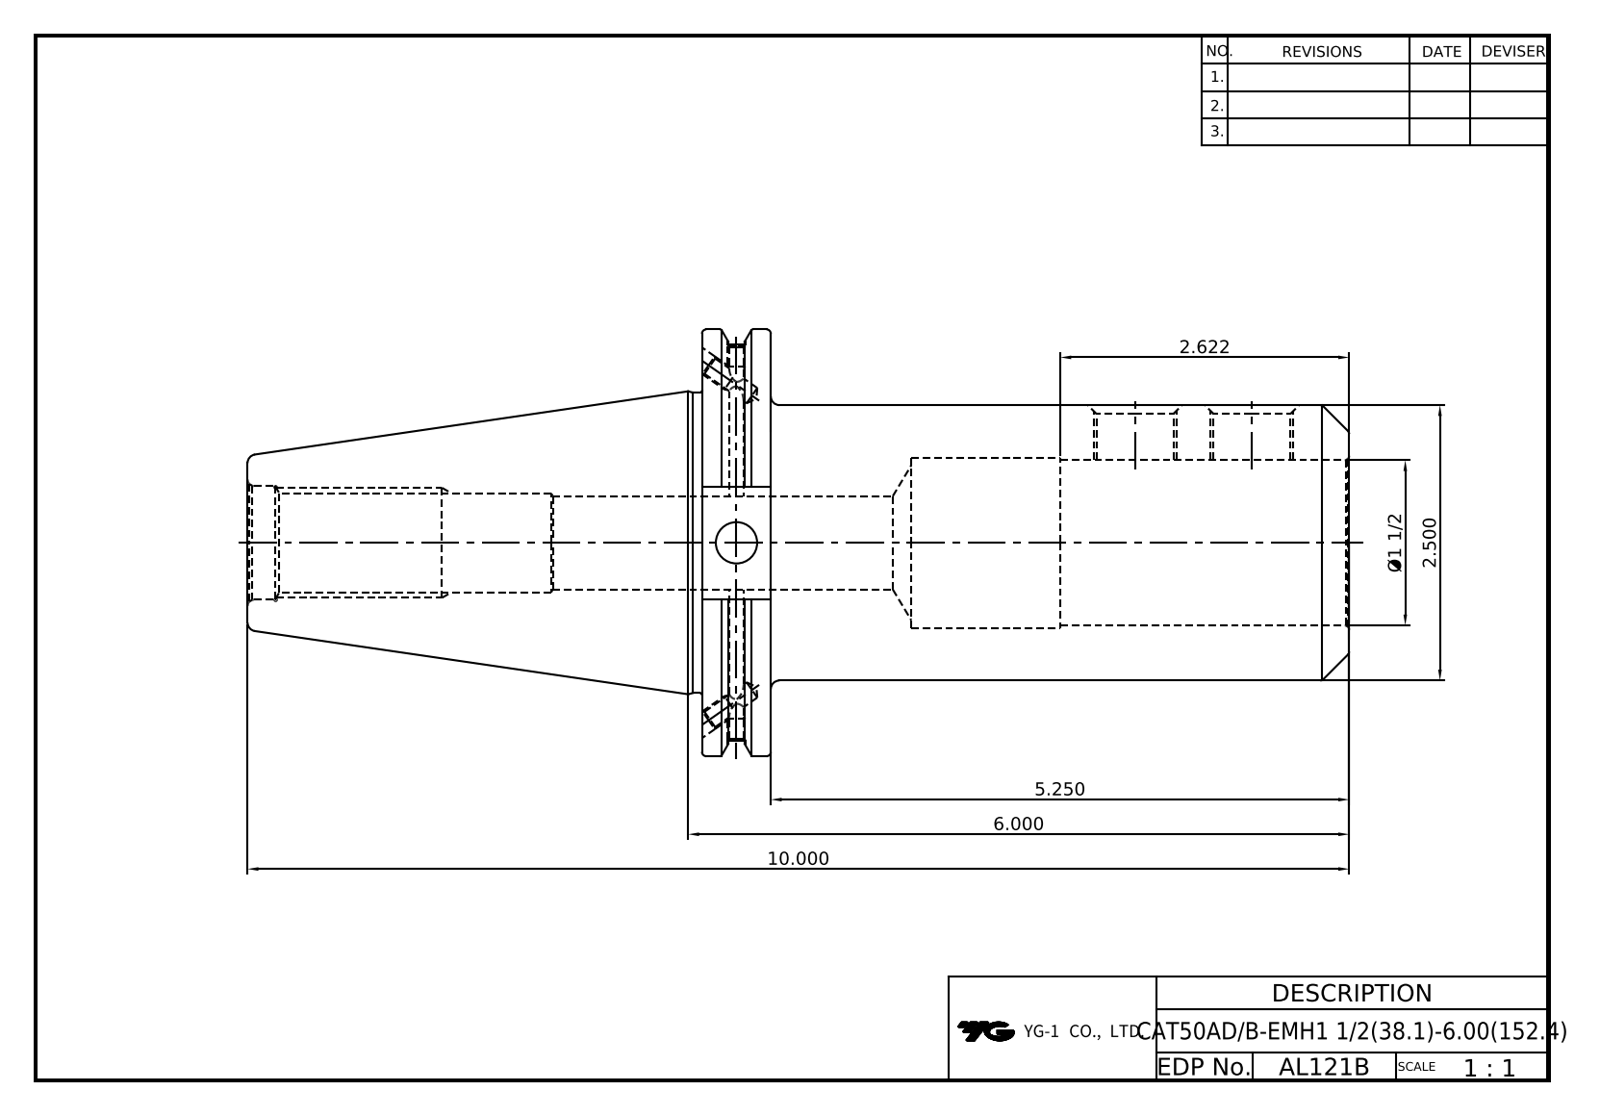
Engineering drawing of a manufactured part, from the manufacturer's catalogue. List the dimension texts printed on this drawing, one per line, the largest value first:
10.000
6.000
5.250
2.622
2.500
Ø1 1/2
